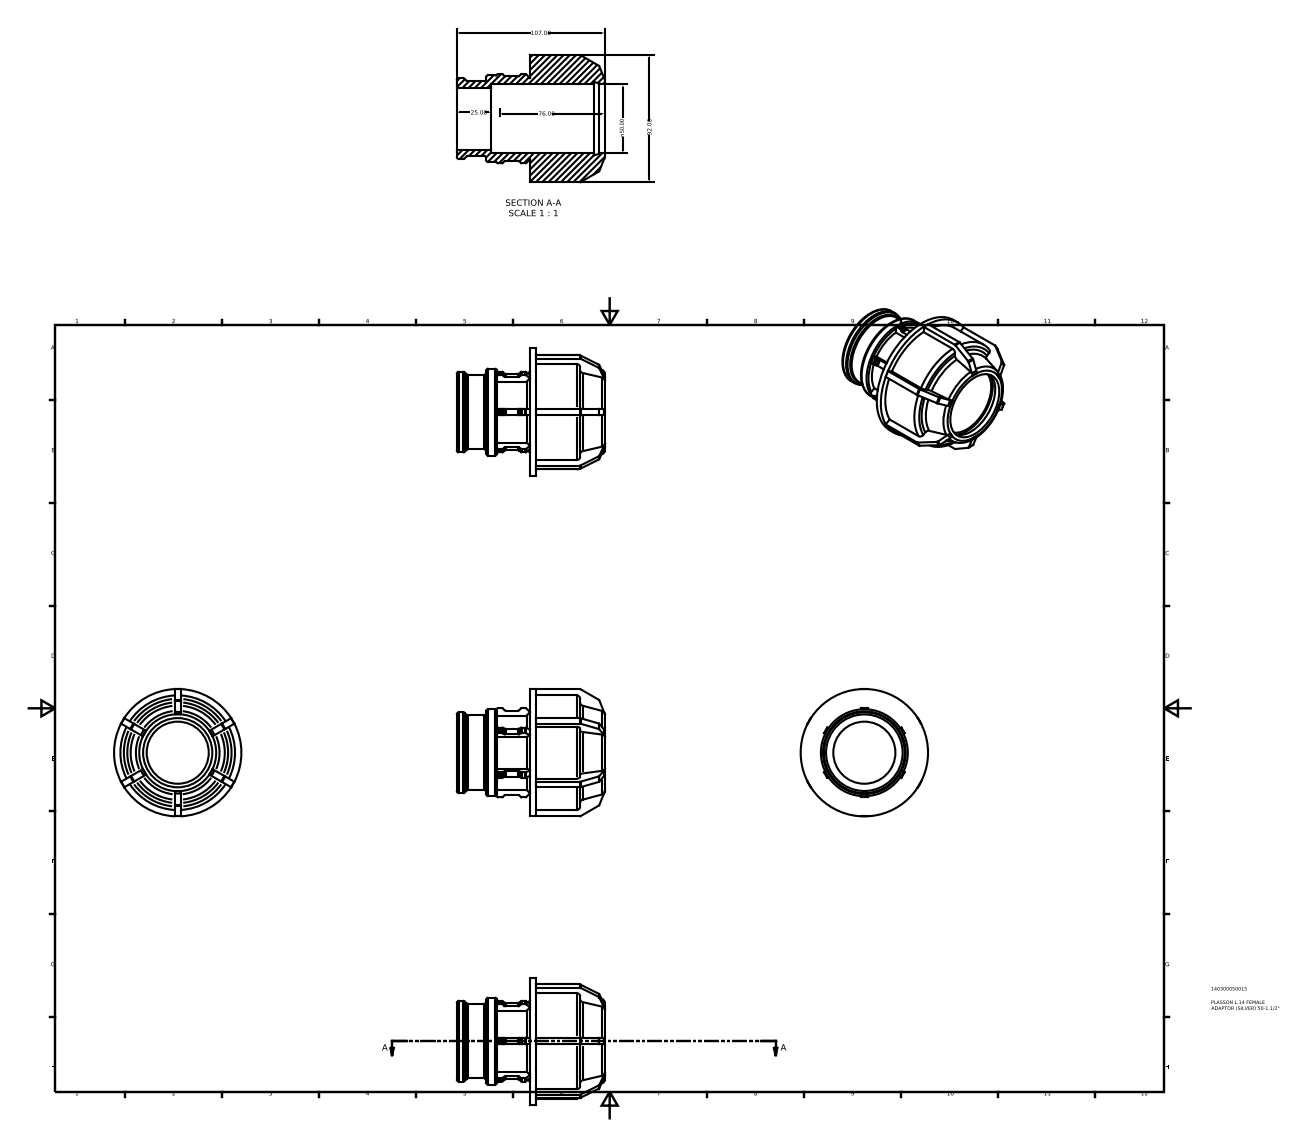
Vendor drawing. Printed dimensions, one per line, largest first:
107.00
92.00
76.00
n50.00
25.00
